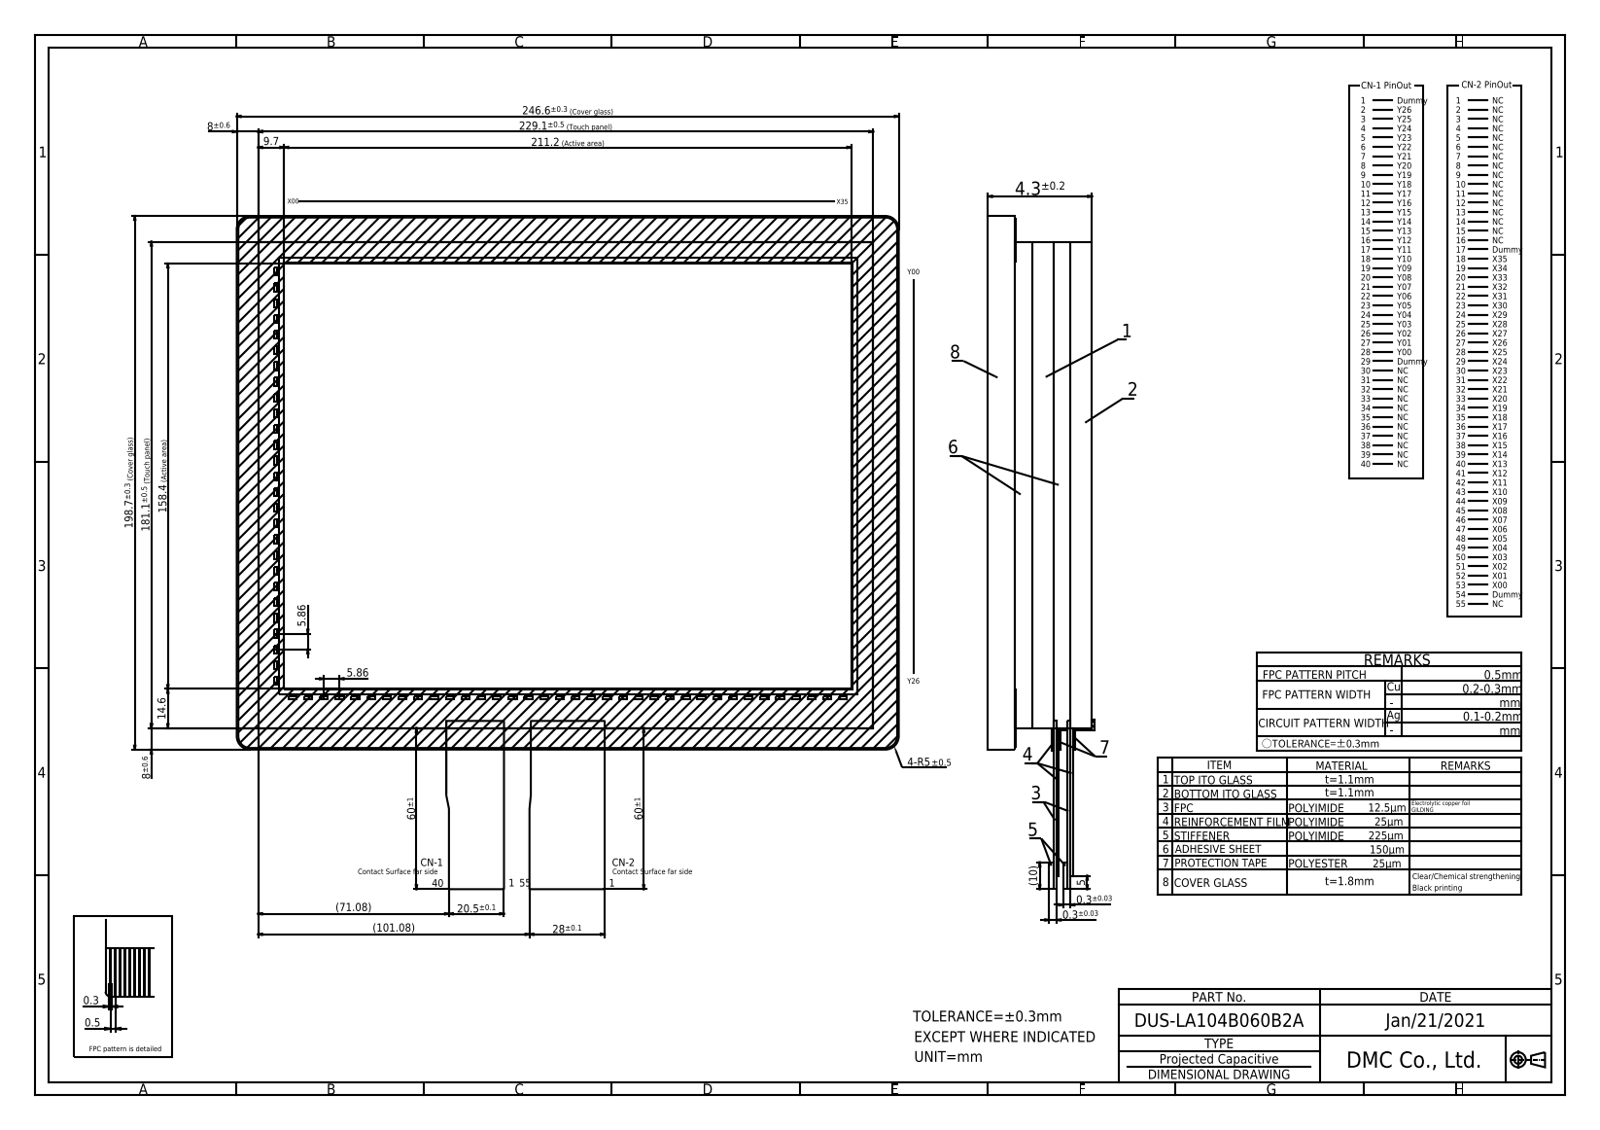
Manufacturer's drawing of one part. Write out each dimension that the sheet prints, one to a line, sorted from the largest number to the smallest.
246.6±0.3 (Cover glass)
229.1±0.5 (Touch panel)
211.2 (Active area)
198.7±0.3 (Cover glass)
181.1±0.5 (Touch panel)
158.4 (Active area)
(101.08)
(71.08)
60±1
60±1
28±0.1
20.5±0.1
14.6
(10)
9.7
8±0.6
8±0.6
5.86
5.86
5
4.3±0.2
0.5
0.3
0.3±0.03
0.3±0.03
